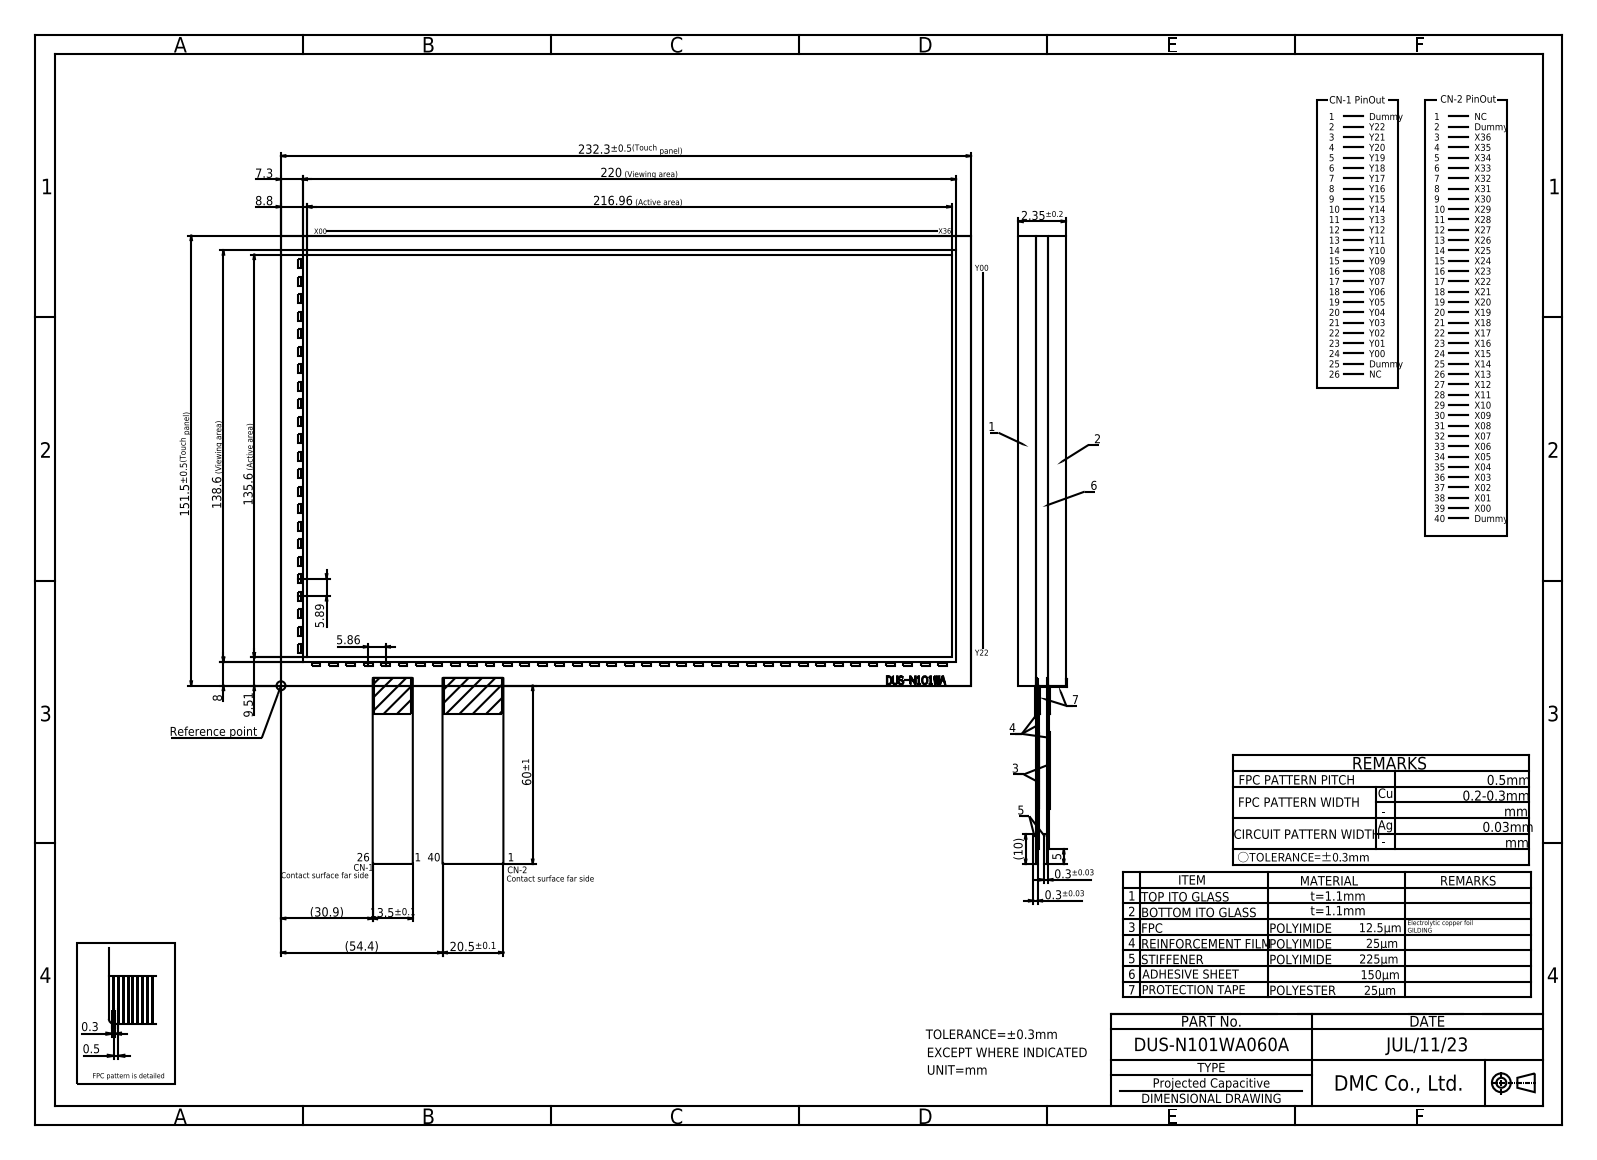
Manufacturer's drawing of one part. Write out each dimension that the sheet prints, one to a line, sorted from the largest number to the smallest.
232.3±0.5(Touch panel)
220 (Viewing area)
216.96 (Active area)
151.5±0.5(Touch panel)
138.6 (Viewing area)
135.6 (Active area)
60±1
(54.4)
(30.9)
20.5±0.1
13.5±0.1
(10)
9.51
8.8
8
7.3
5.89
5.86
5
2.35±0.2
0.5
0.3
0.3±0.03
0.3±0.03
